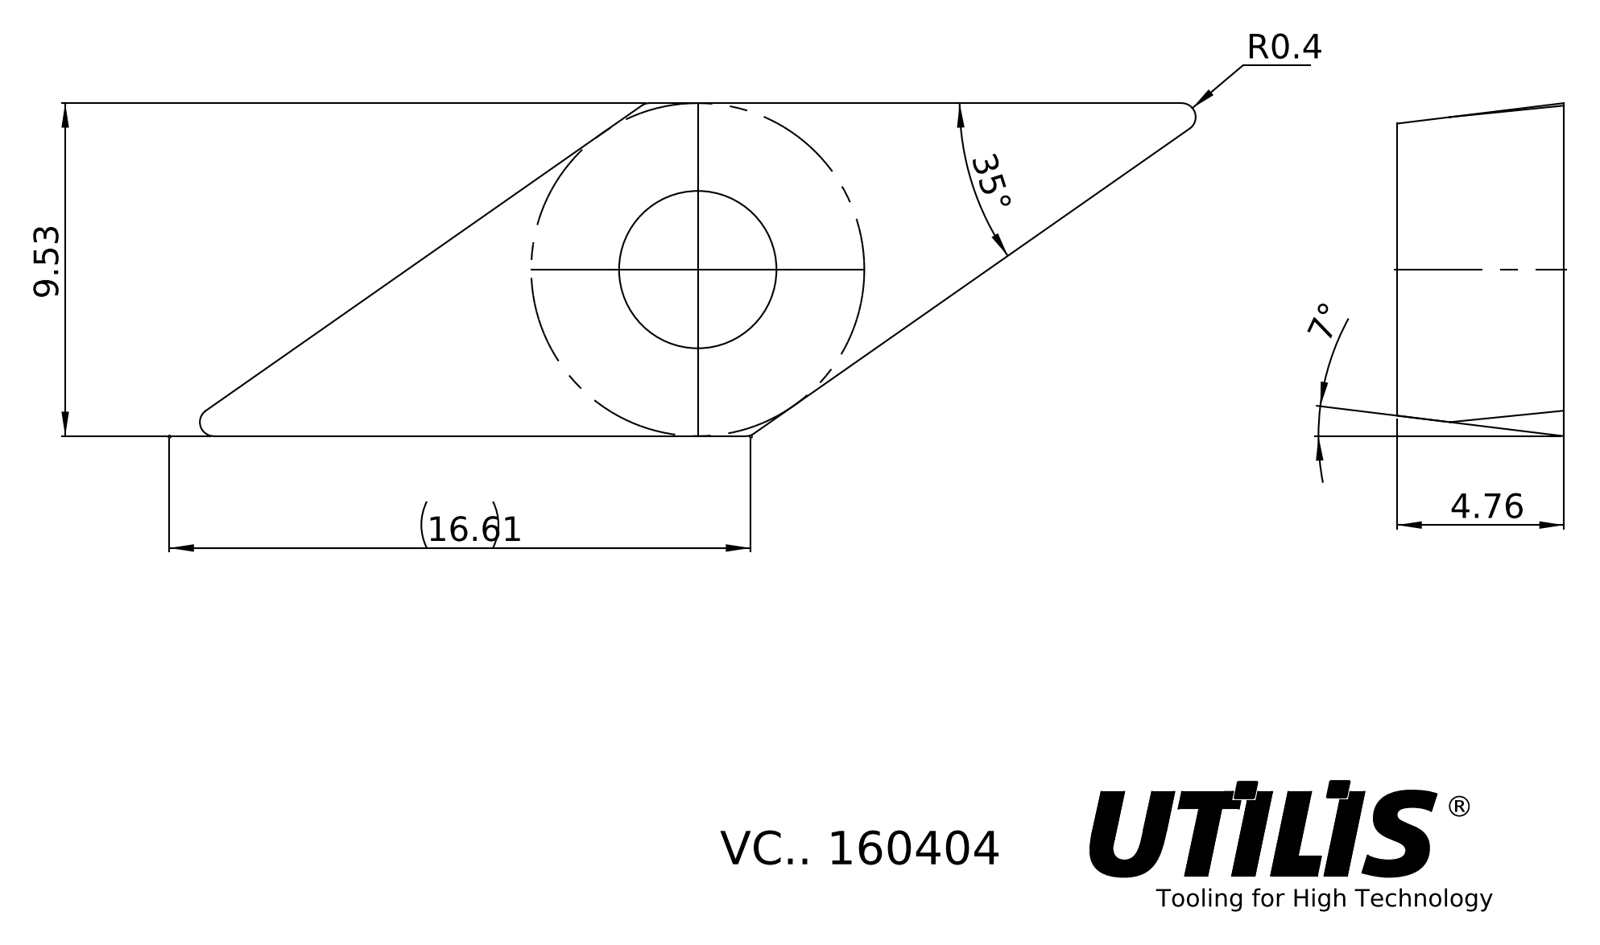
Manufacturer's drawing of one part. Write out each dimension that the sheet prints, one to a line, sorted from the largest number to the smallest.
35°
16.61
9.53
4.76
R0.4
